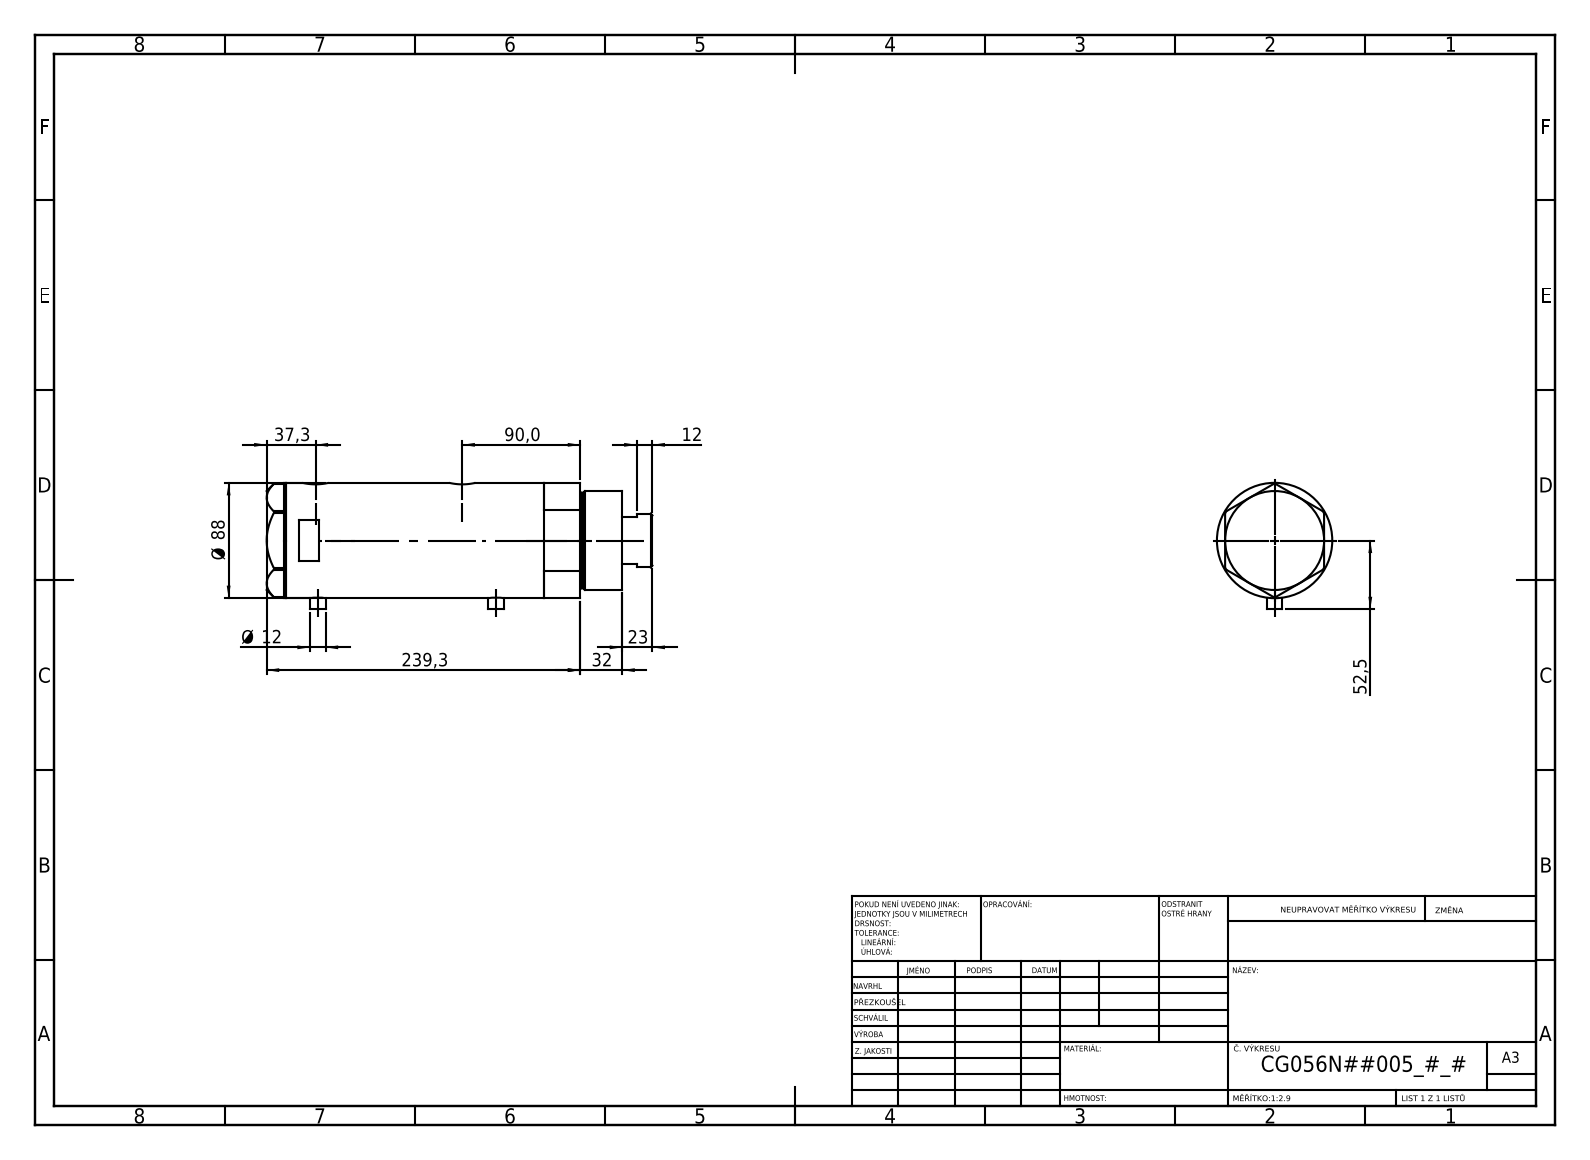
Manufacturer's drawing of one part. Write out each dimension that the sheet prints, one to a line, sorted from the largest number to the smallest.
239,3
90,0
Ø 88
52,5
37,3
32
23
12
Ø 12
